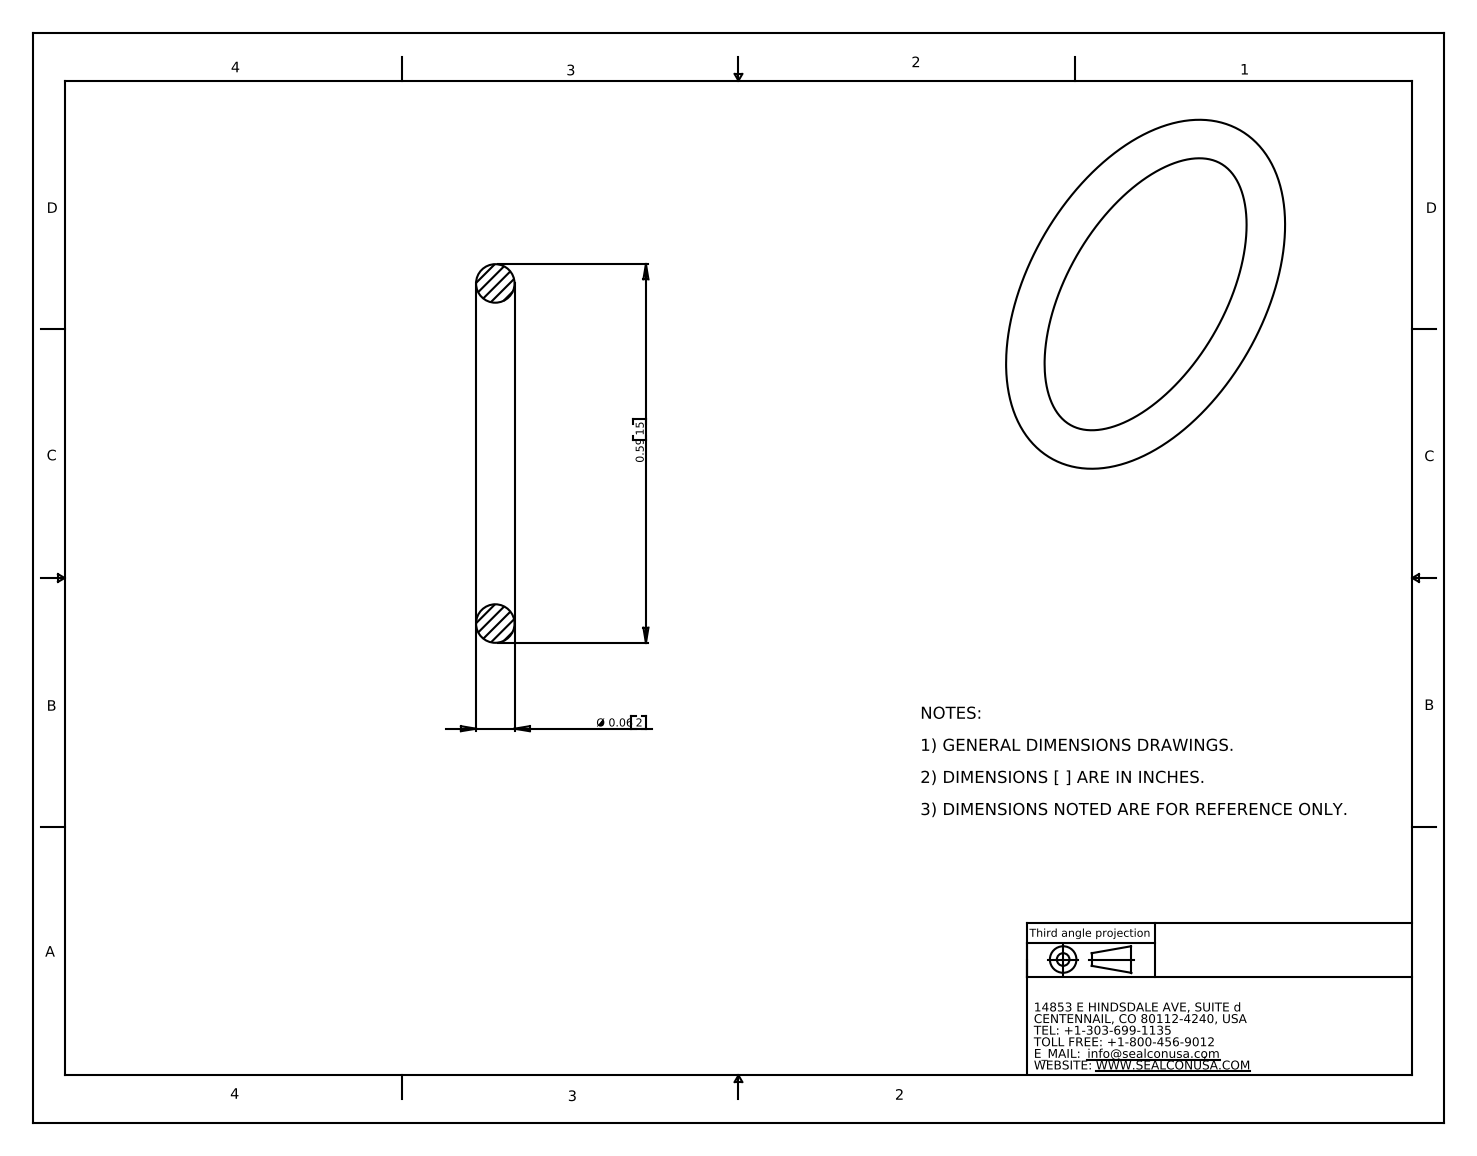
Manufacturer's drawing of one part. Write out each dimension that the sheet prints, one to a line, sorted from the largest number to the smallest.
0.59 15
Ø 0.06 2
